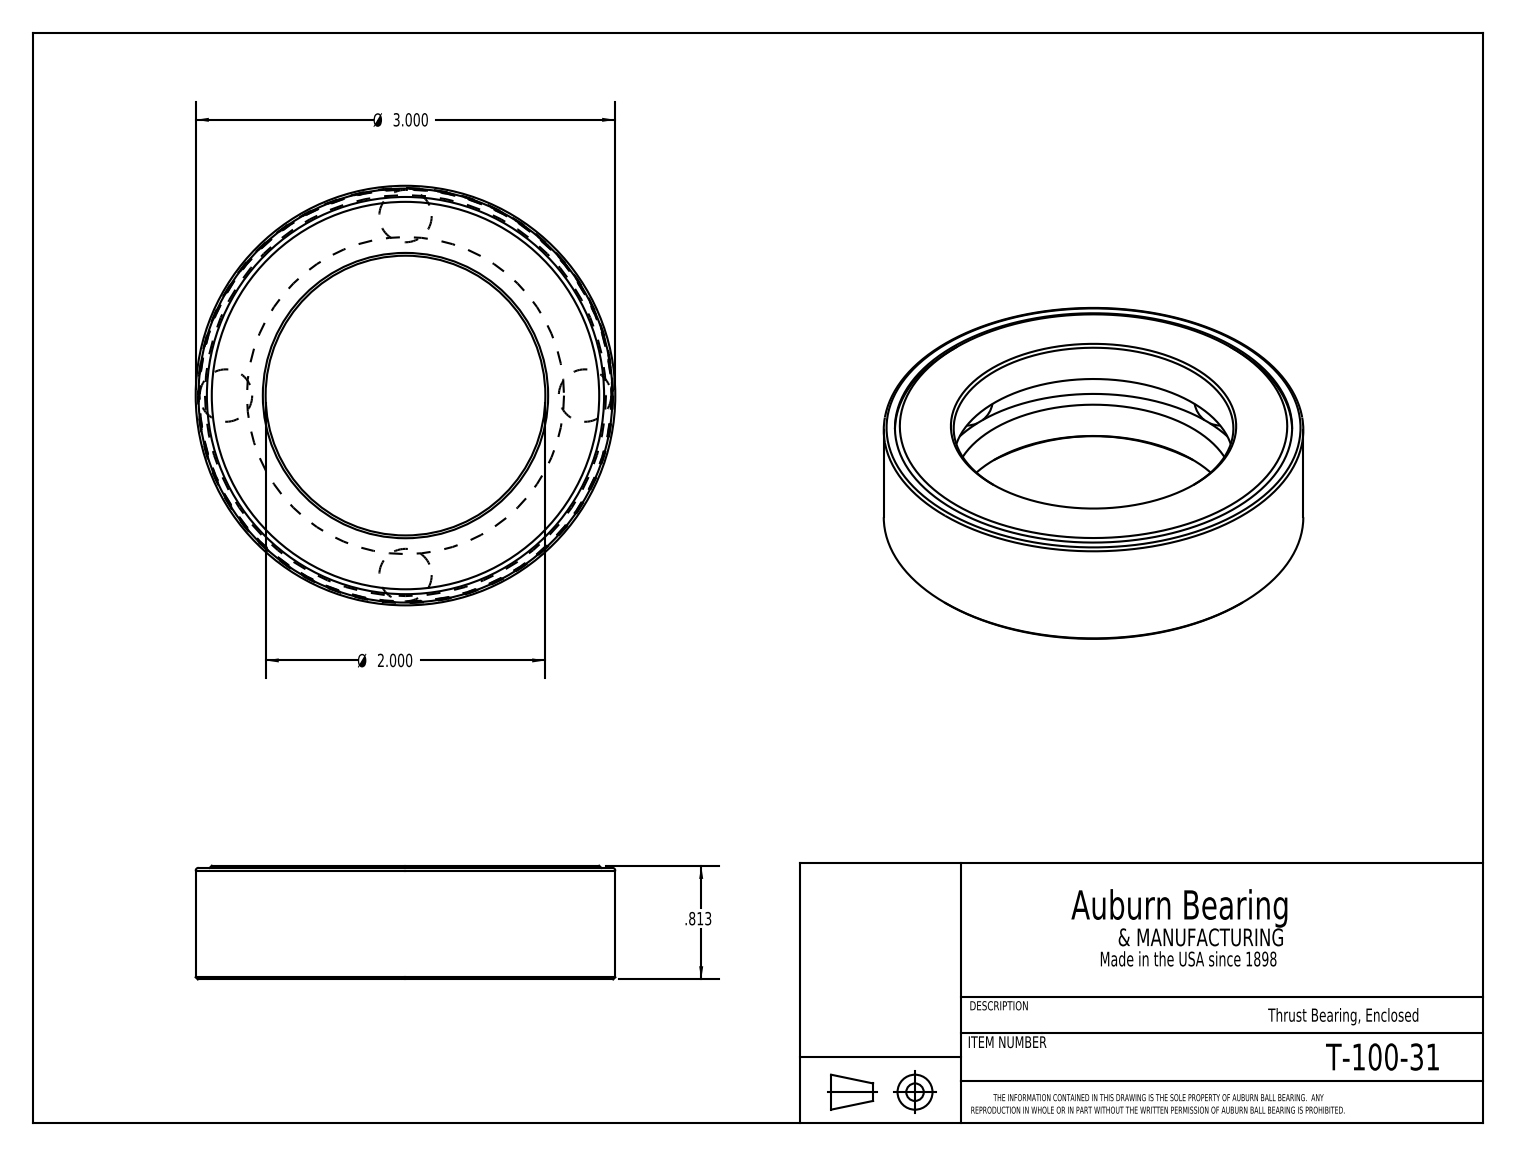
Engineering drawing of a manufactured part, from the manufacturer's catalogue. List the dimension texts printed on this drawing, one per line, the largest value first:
Ø 3.000
Ø 2.000
.813
